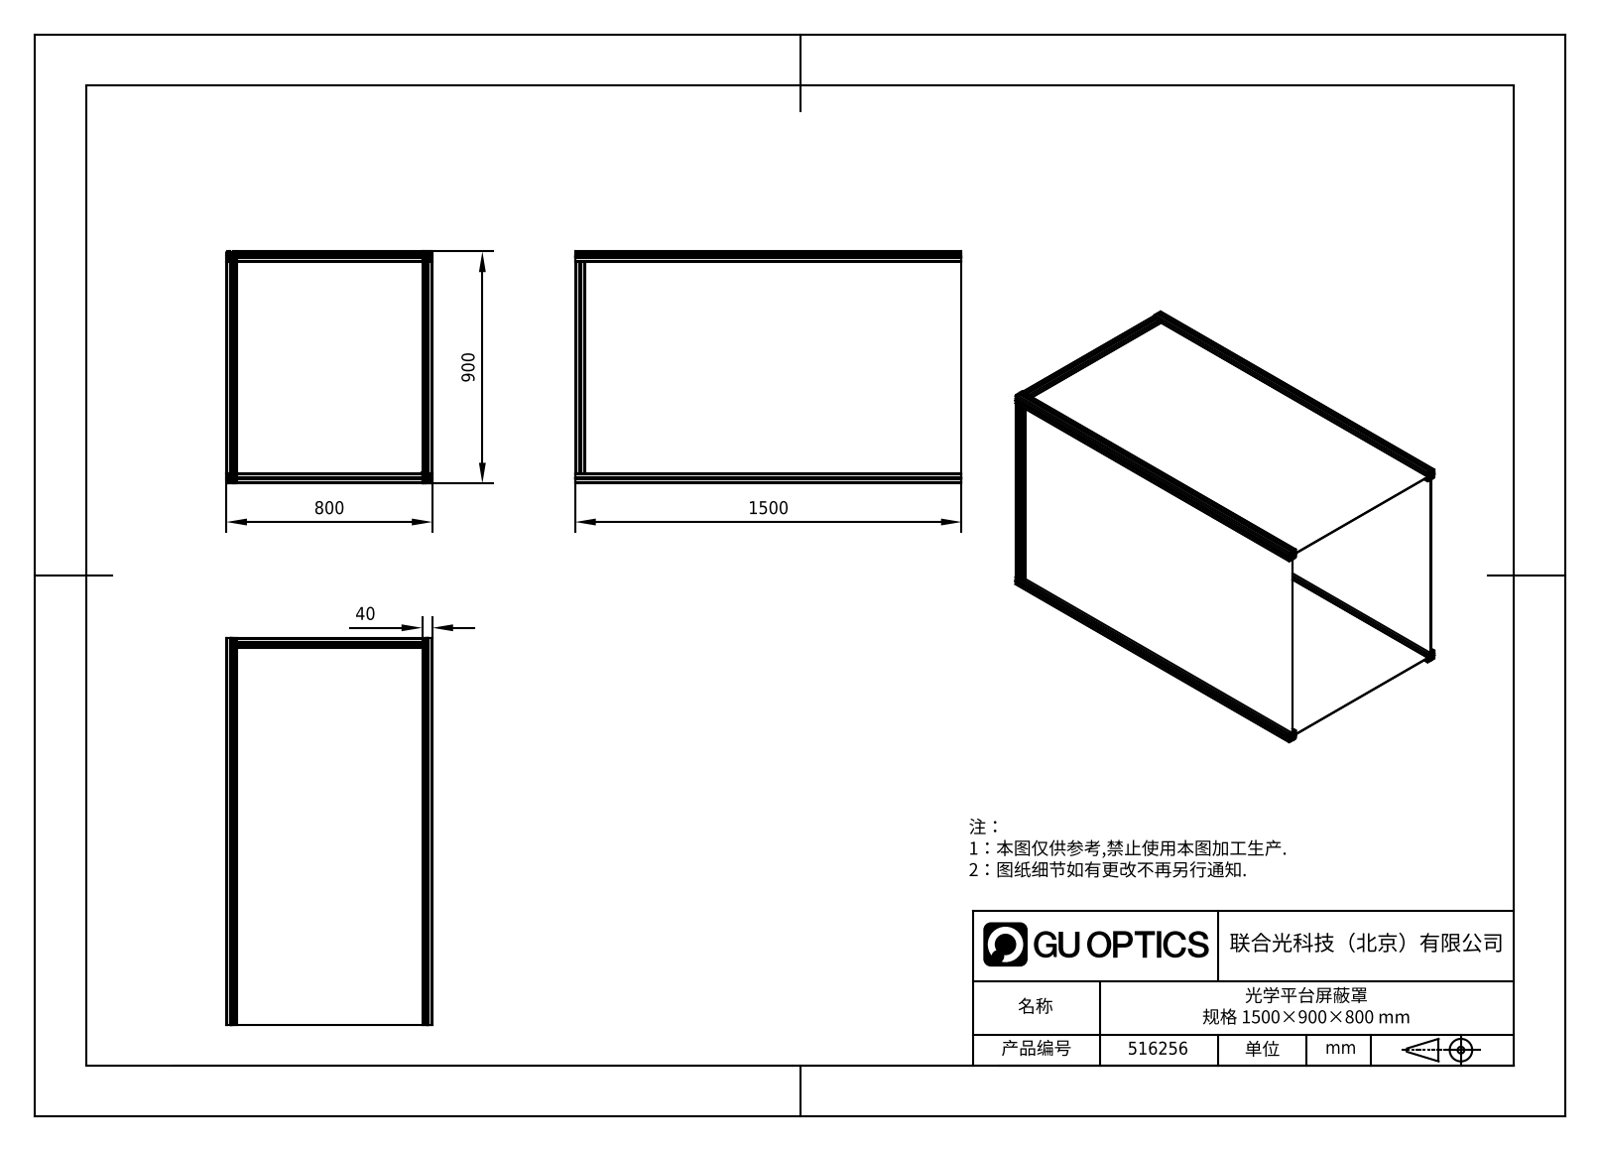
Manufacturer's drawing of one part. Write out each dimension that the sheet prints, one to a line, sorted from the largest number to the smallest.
1500
900
800
40
